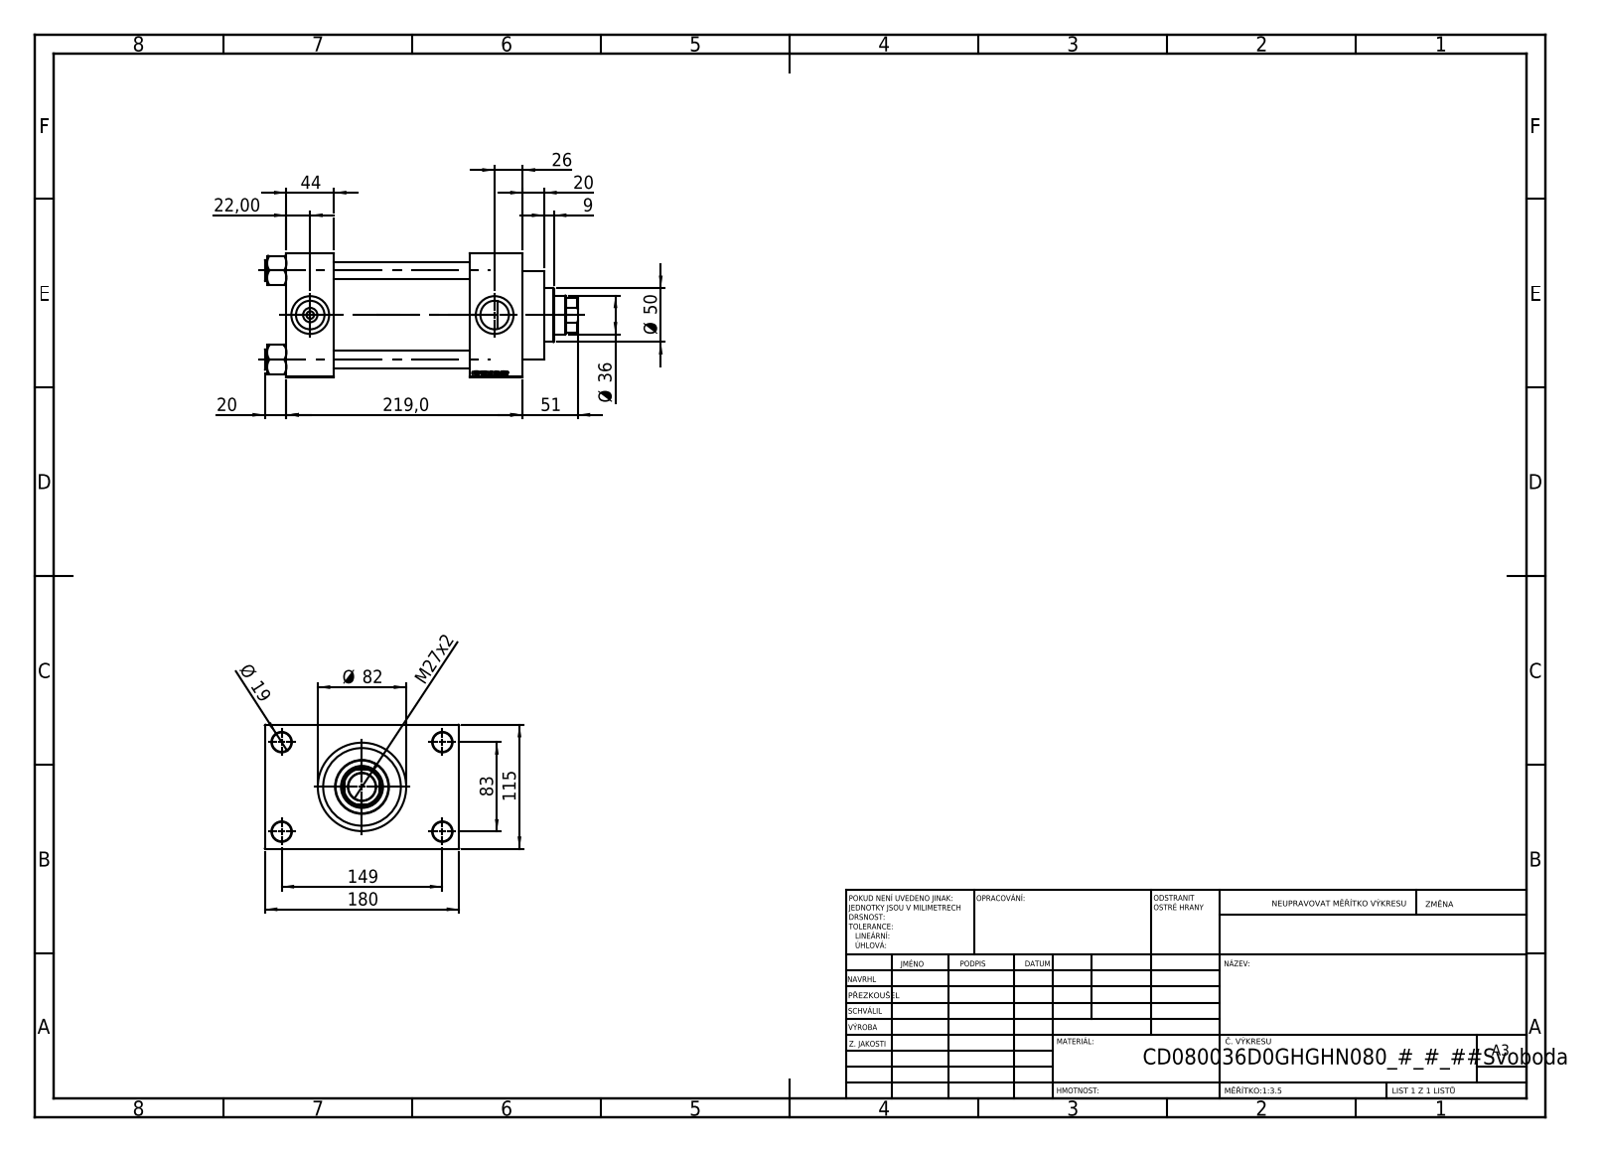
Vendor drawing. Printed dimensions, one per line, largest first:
219,0
180
149
115
83
Ø 82
51
Ø 50
44
Ø 36
M27x2
26
22,00
20
20
Ø 19
9
